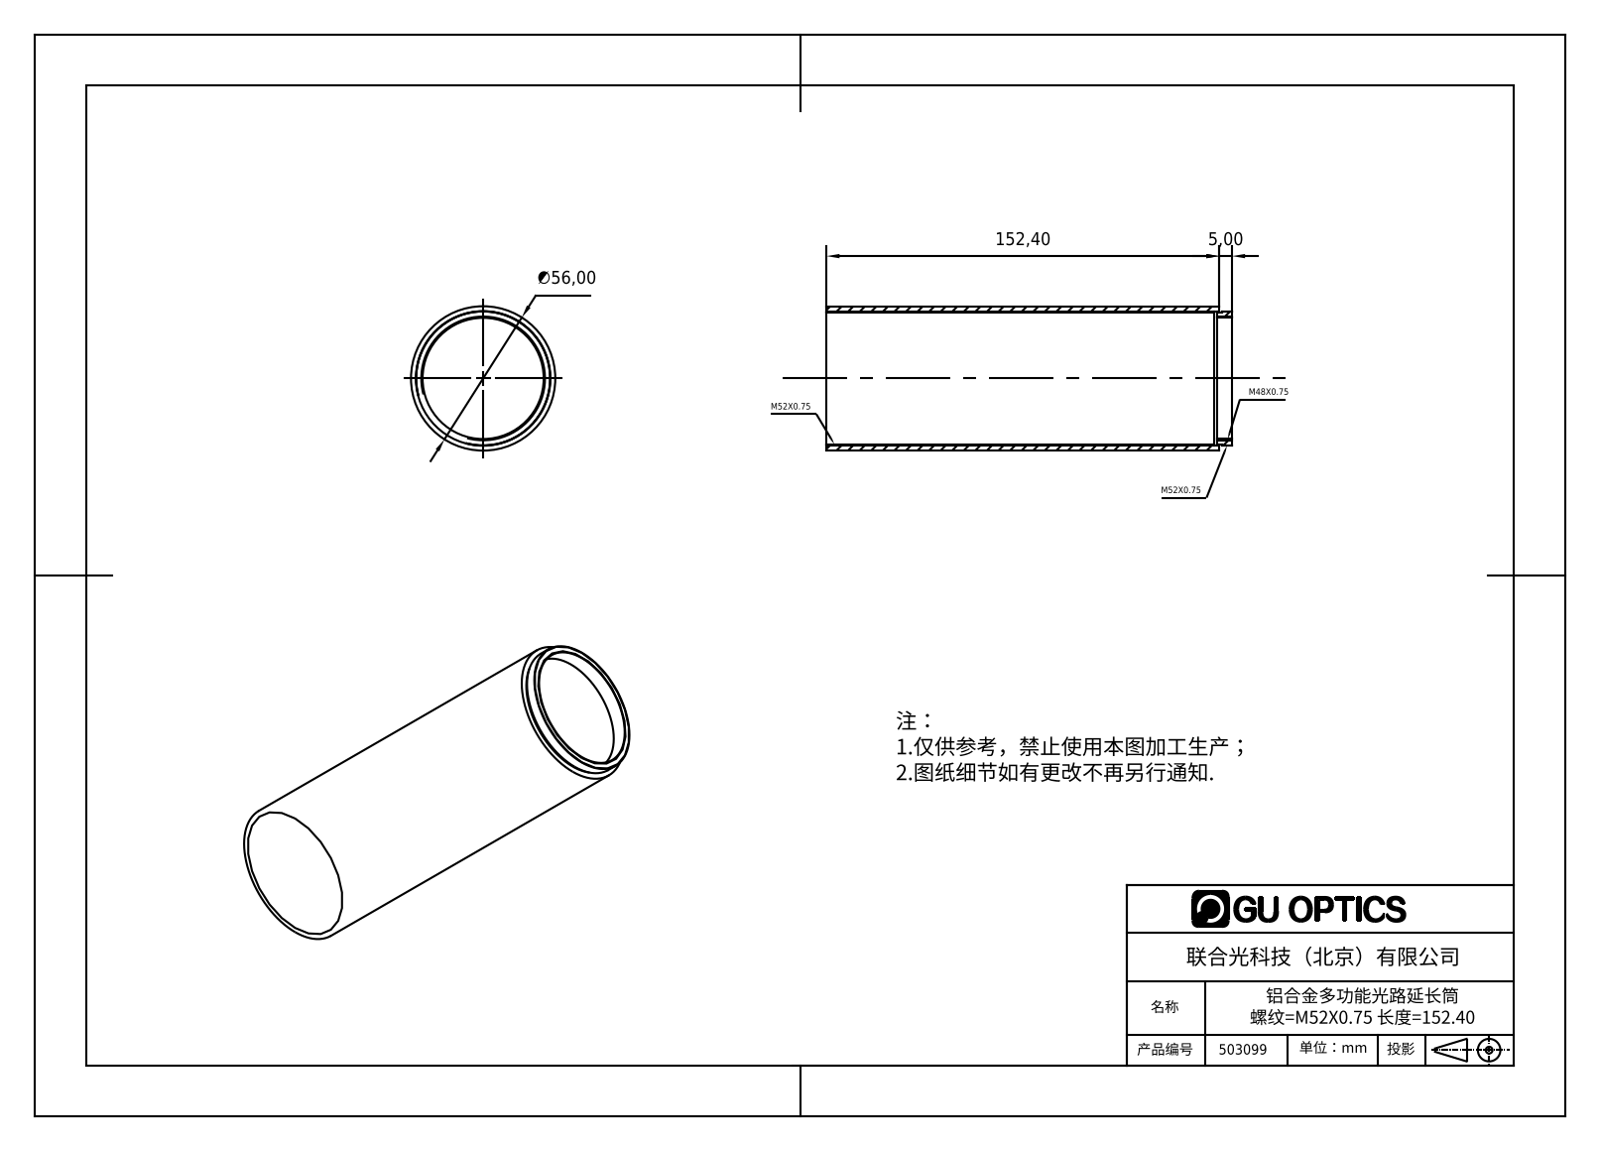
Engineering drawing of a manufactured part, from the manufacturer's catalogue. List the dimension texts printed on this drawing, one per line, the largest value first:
152,40
∅56,00
5,00
